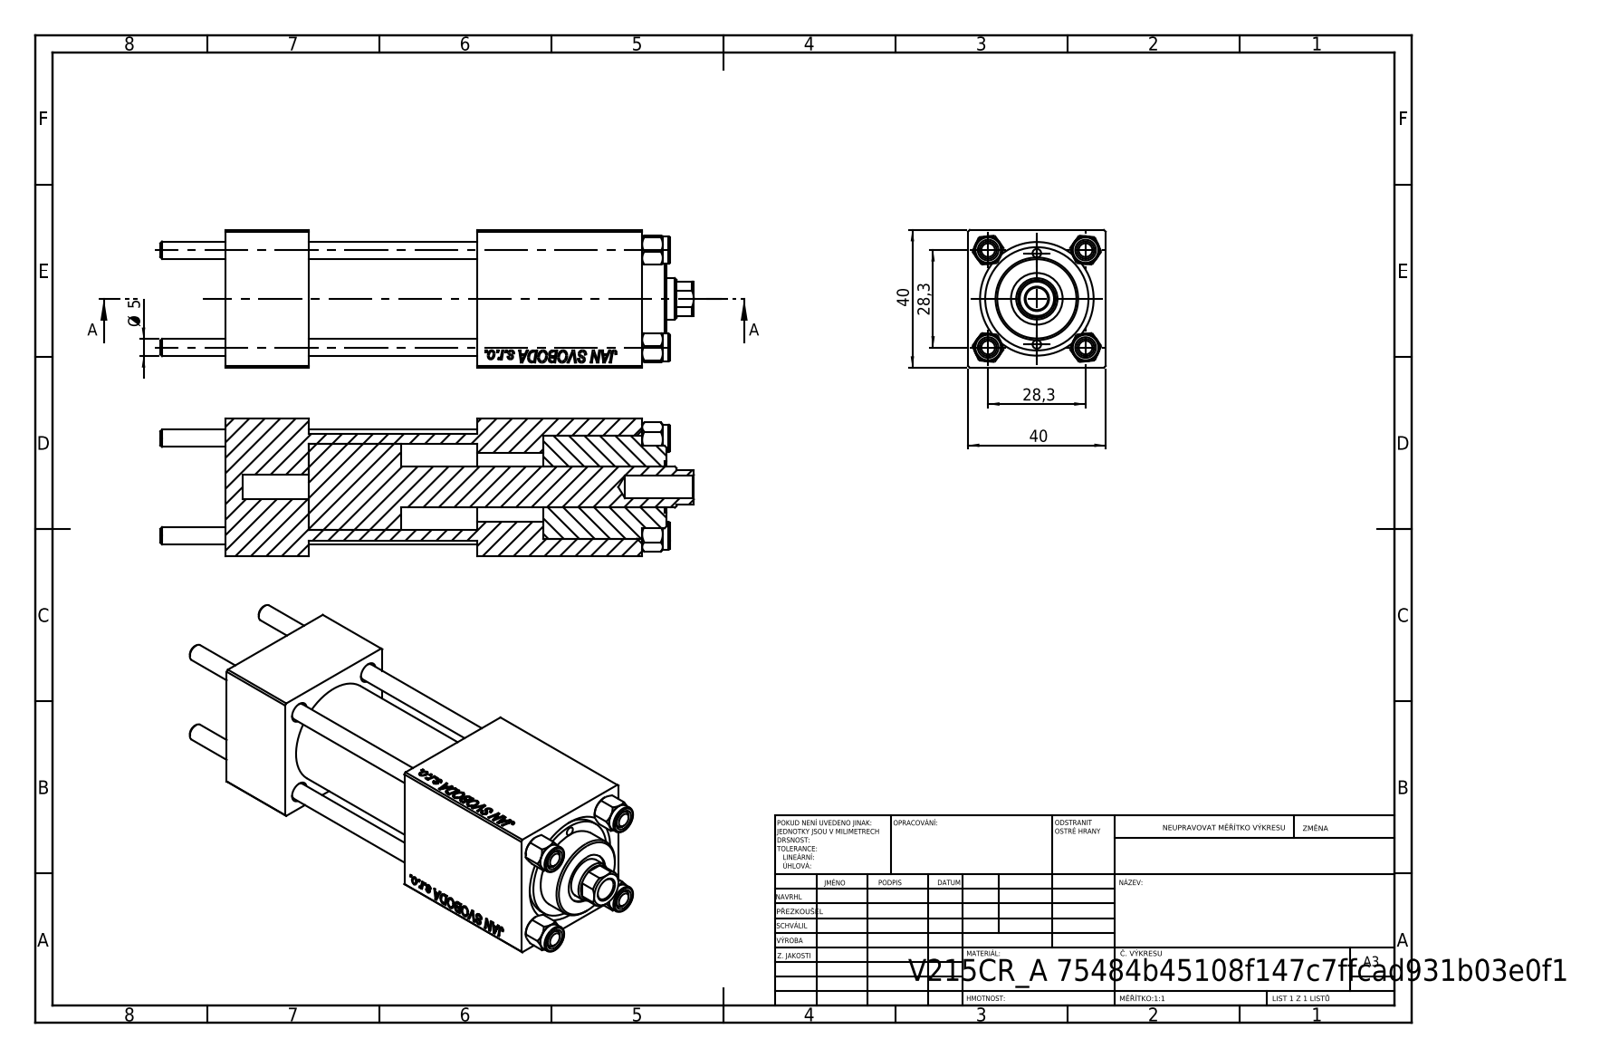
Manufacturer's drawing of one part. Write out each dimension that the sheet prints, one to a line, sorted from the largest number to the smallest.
40
40
28,3
28,3
Ø 5
